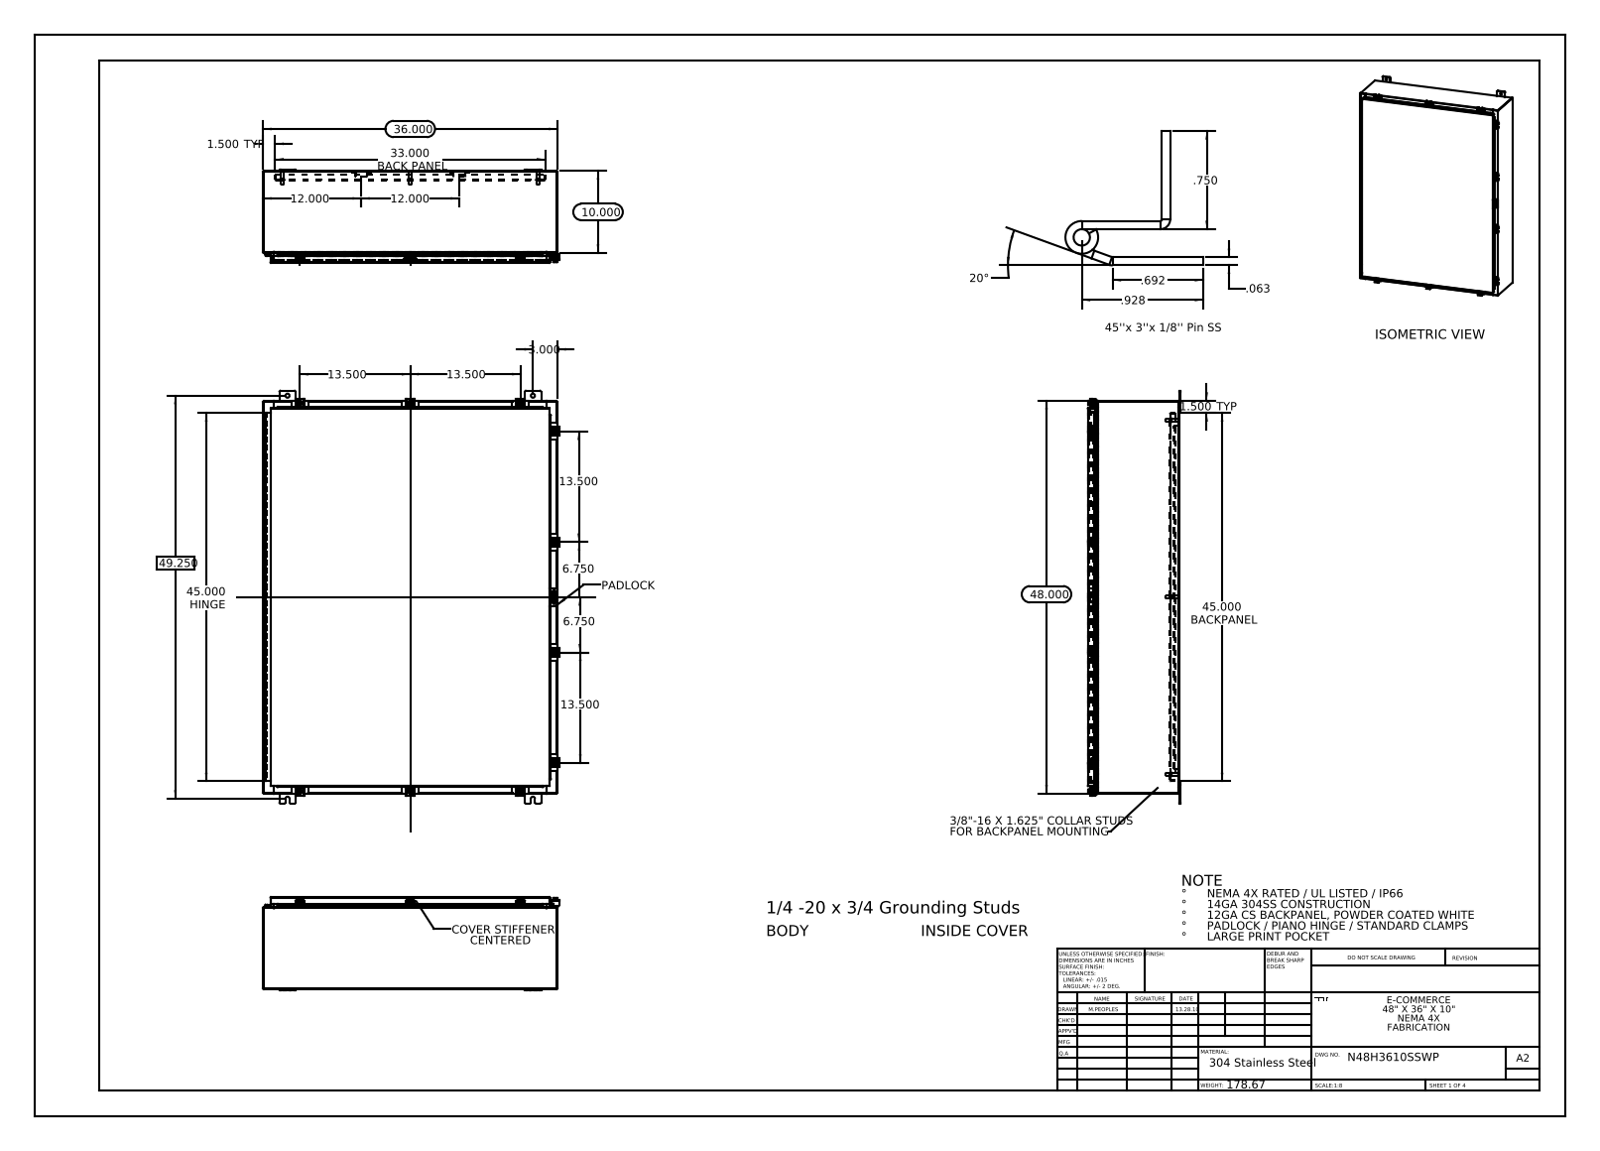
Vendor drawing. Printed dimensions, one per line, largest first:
49.250
48.000
45.000 HINGE
45.000 BACKPANEL
36.000
33.000 BACK PANEL
20°
13.500
13.500
13.500
13.500
12.000
12.000
10.000
6.750
6.750
3.000
1.500 TYP
1.500 TYP
.928
.750
.692
.063
